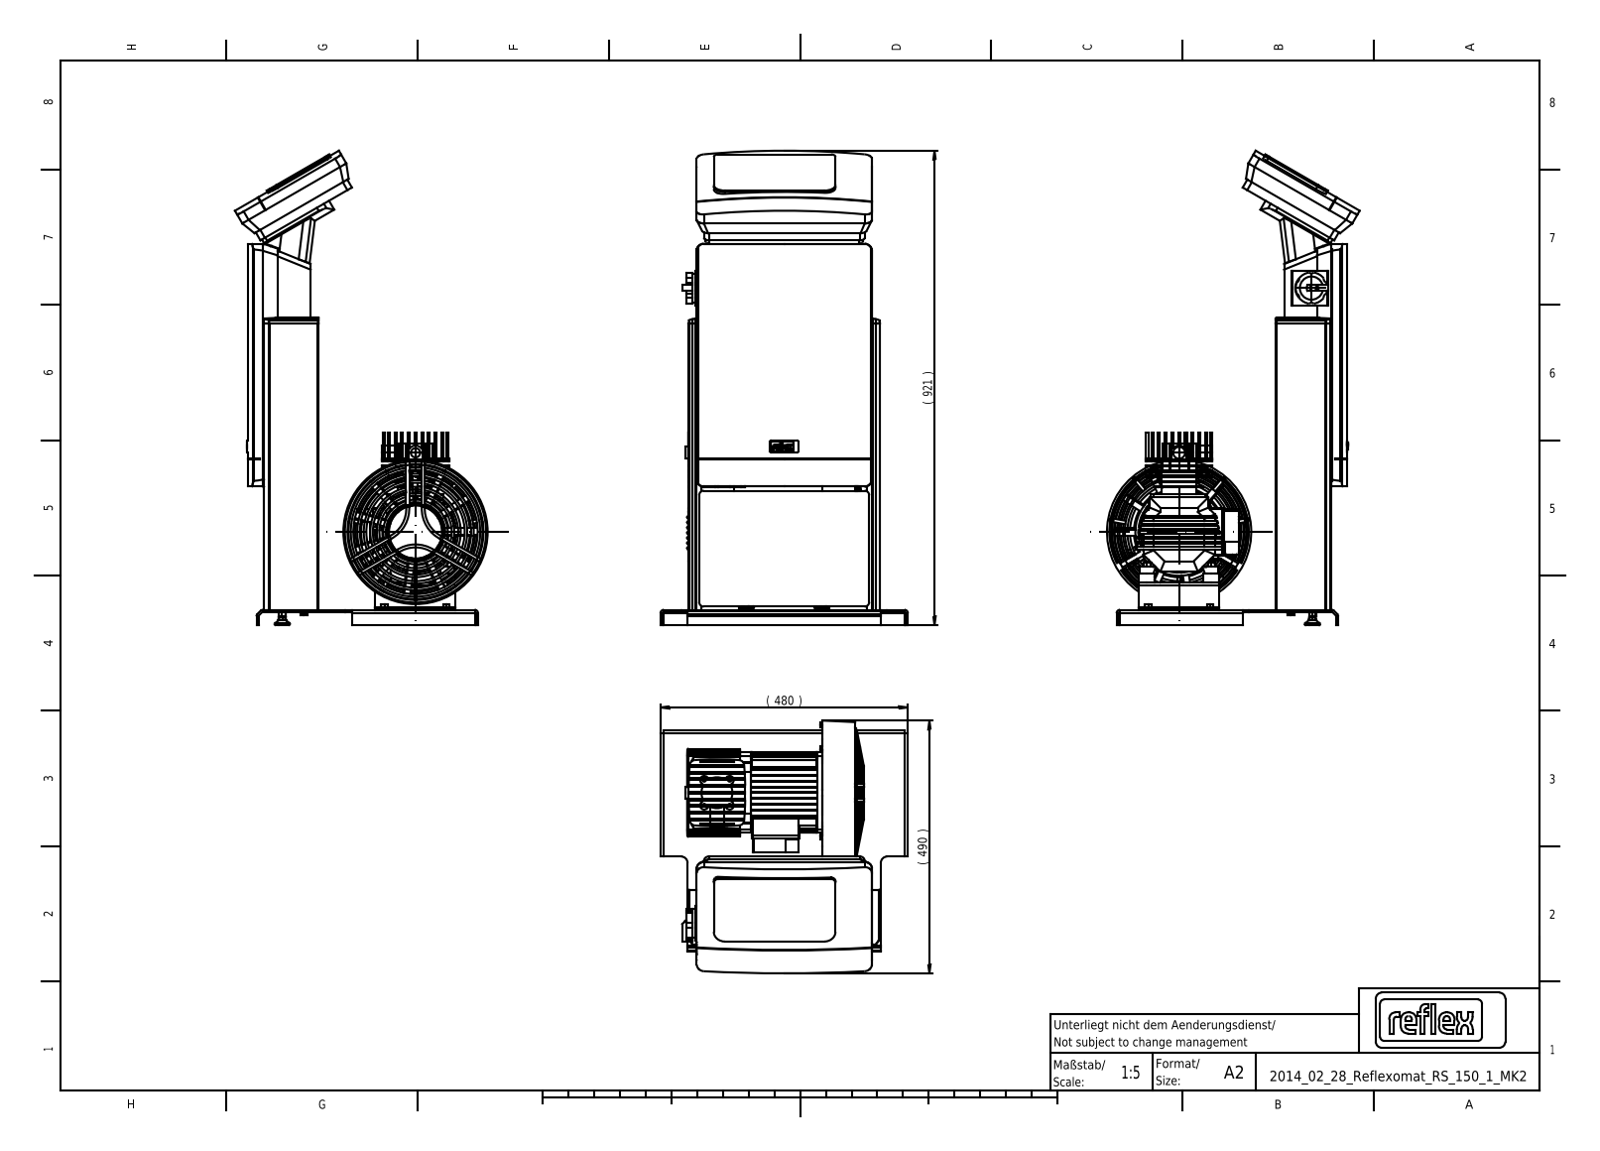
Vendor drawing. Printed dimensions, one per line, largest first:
921 ( )
490 ( )
480 ( )
